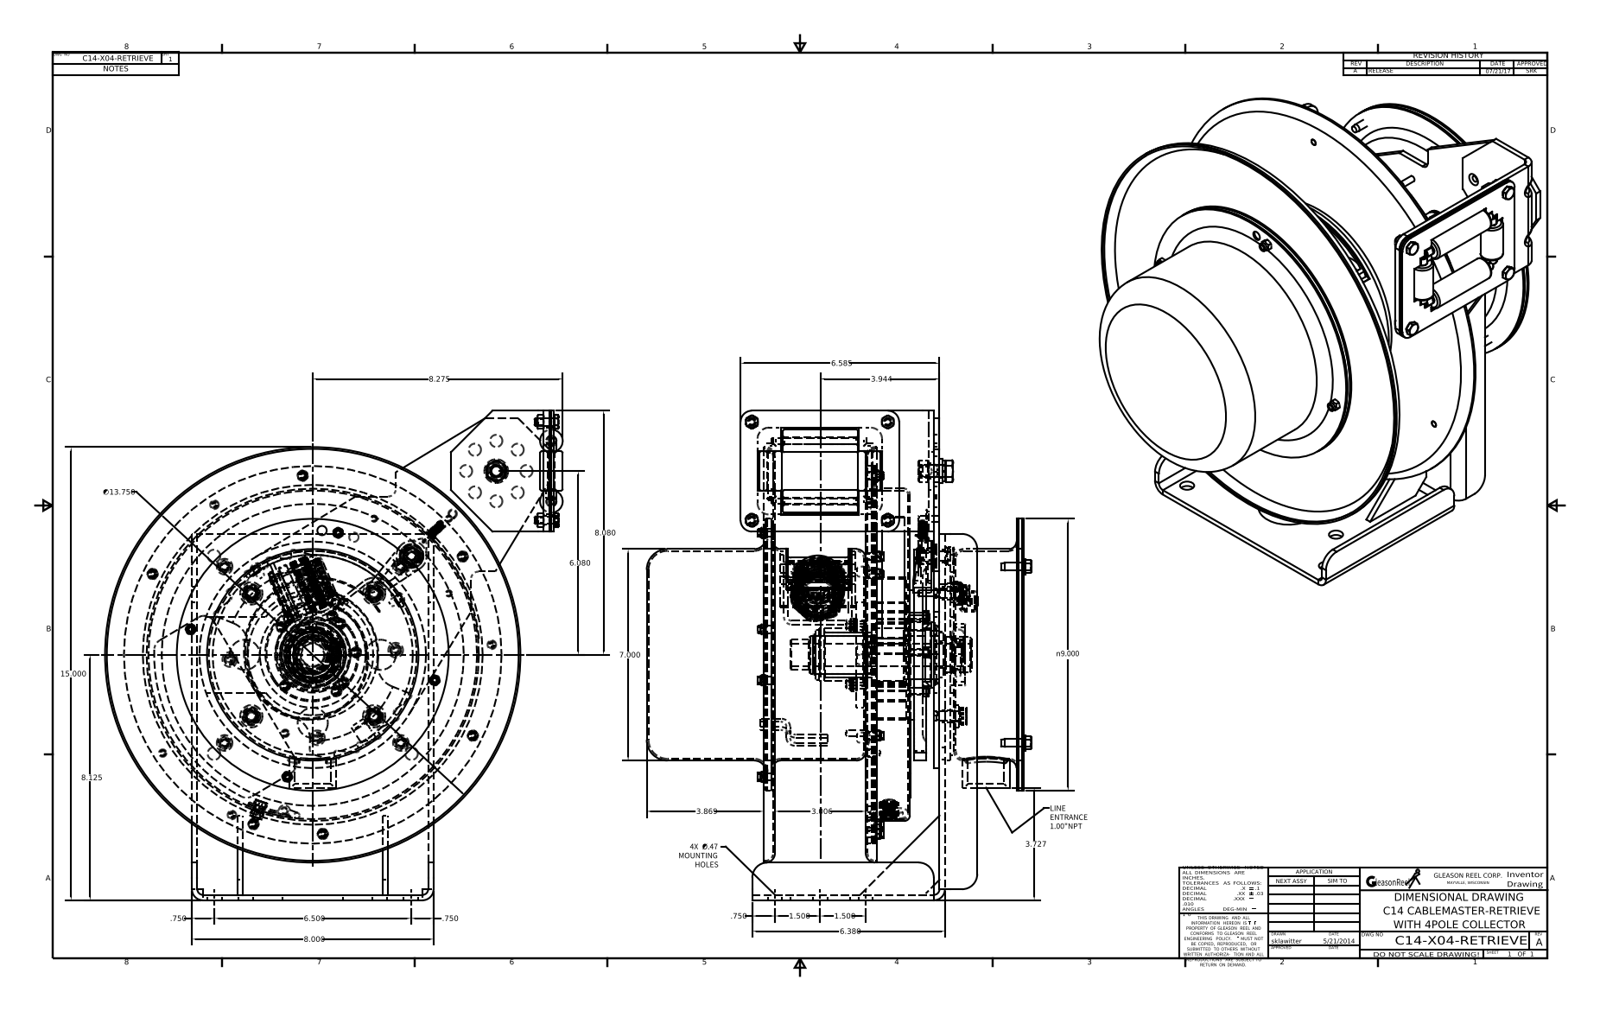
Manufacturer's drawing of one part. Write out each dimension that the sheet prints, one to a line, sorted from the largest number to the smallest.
15.000
∅13.750
n9.000
8.275
8.125
8.080
8.000
7.000
6.585
6.500
6.380
6.080
3.944
3.869
3.727
3.006
1.500
1.500
.750
.750
.750
